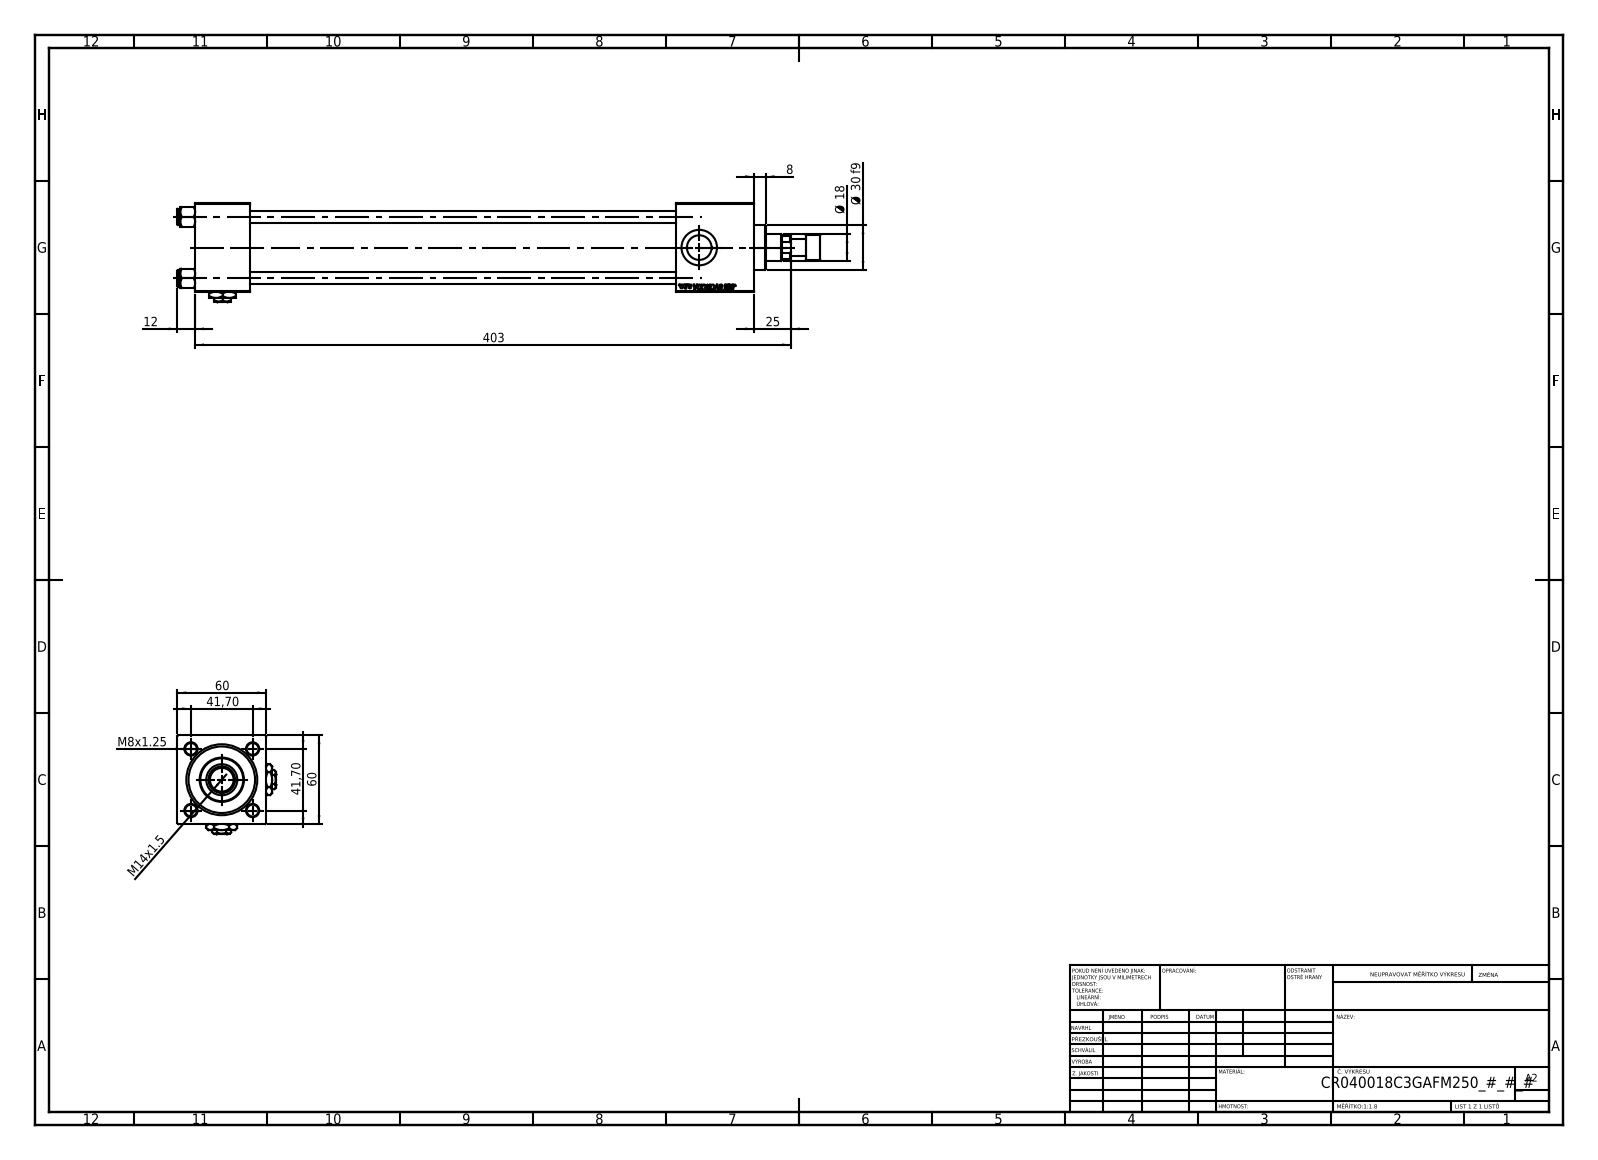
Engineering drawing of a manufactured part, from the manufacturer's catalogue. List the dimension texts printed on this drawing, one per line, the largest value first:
403
60
60
41,70
41,70
Ø 30 f9
25
Ø 18
M14x1.5
12
8
M8x1.25
